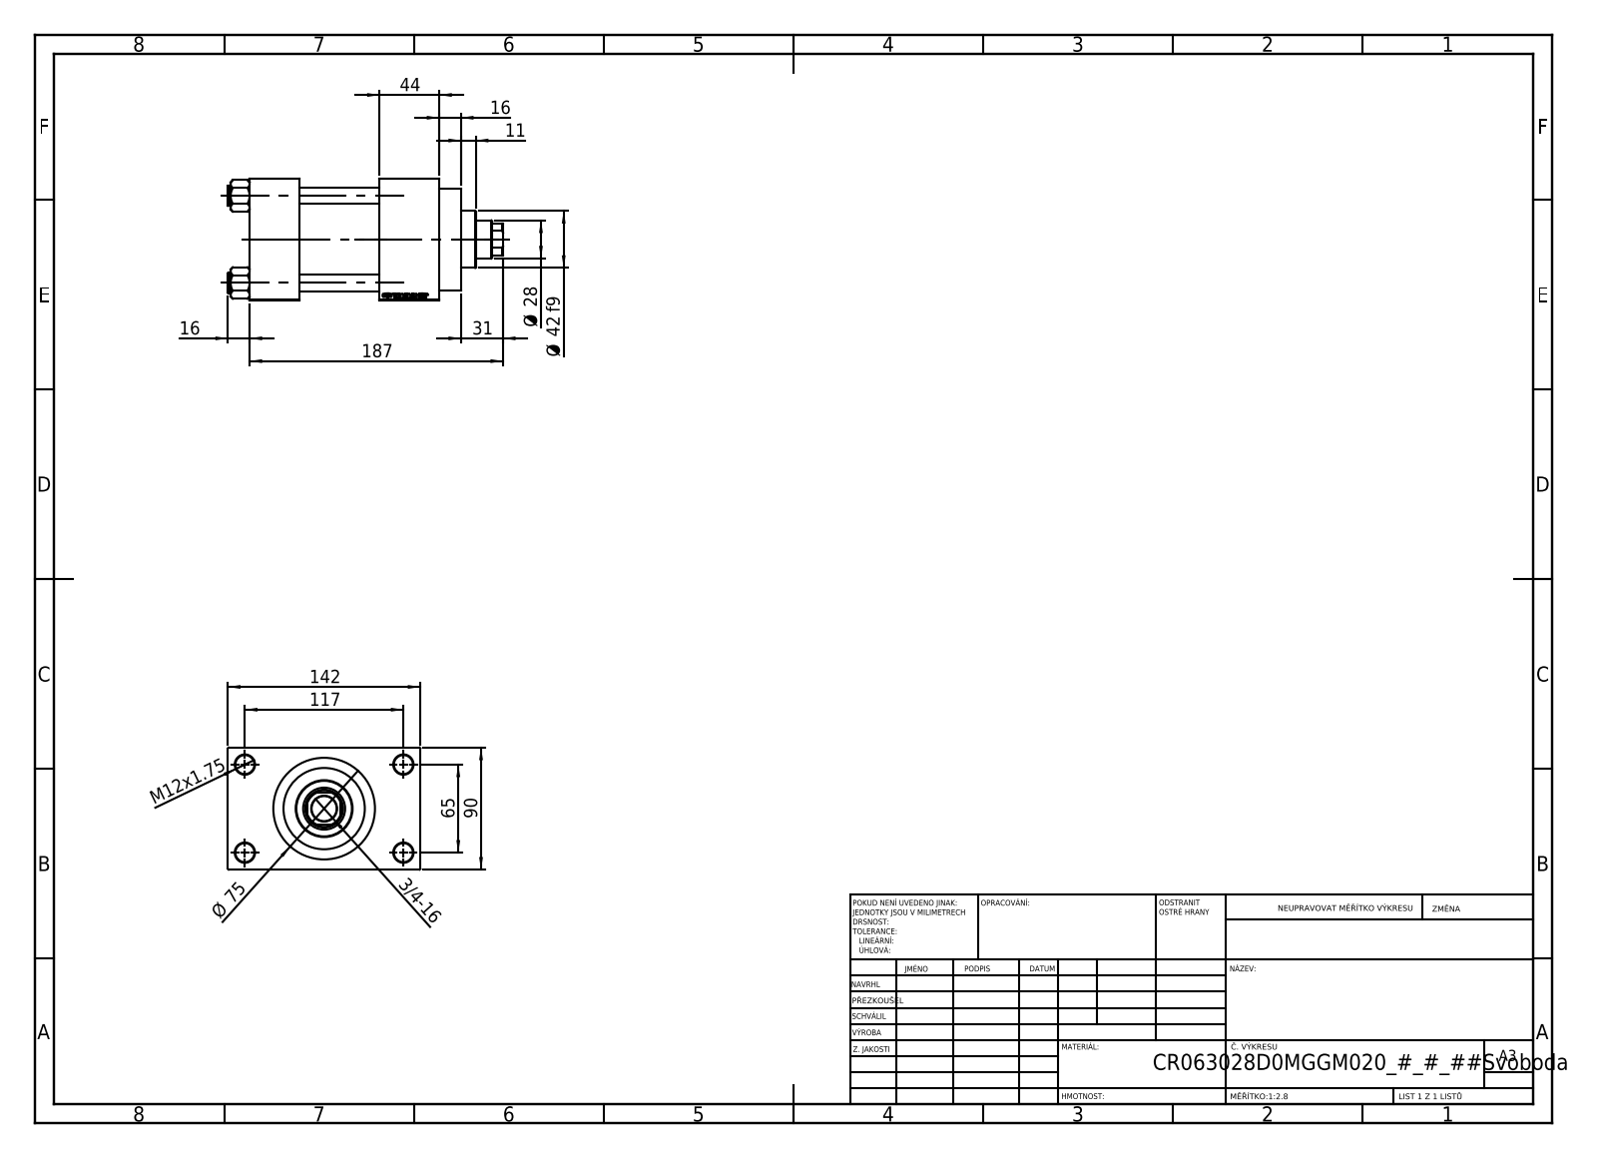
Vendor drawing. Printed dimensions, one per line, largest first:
187
142
117
90
Ø 75
65
44
Ø 42 f9
31
Ø 28
16
16
M12x1.75
11
3/4-16
